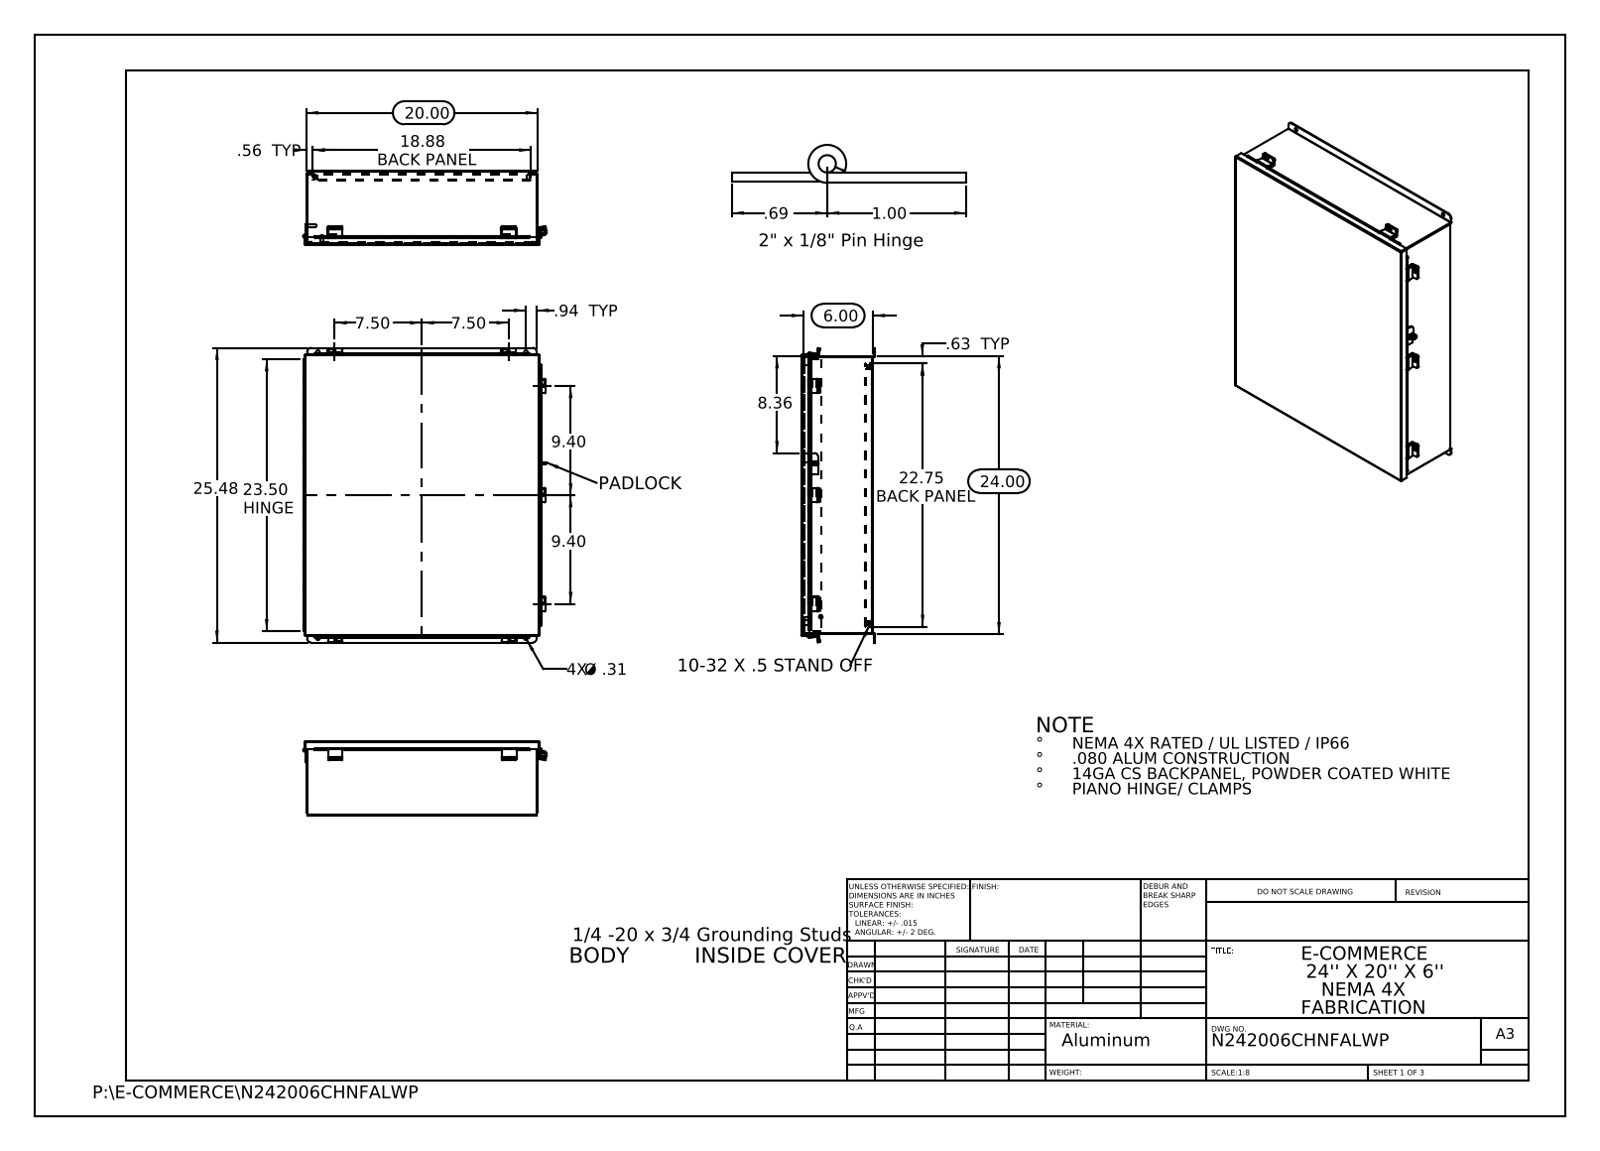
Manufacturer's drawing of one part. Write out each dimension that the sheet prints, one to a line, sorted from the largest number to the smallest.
25.48
24.00
23.50 HINGE
22.75 BACK PANEL
20.00
18.88 BACK PANEL
9.40
9.40
8.36
7.50
7.50
6.00
1.00
.94 TYP
.69
.63 TYP
.56 TYP
4X Ø .31
